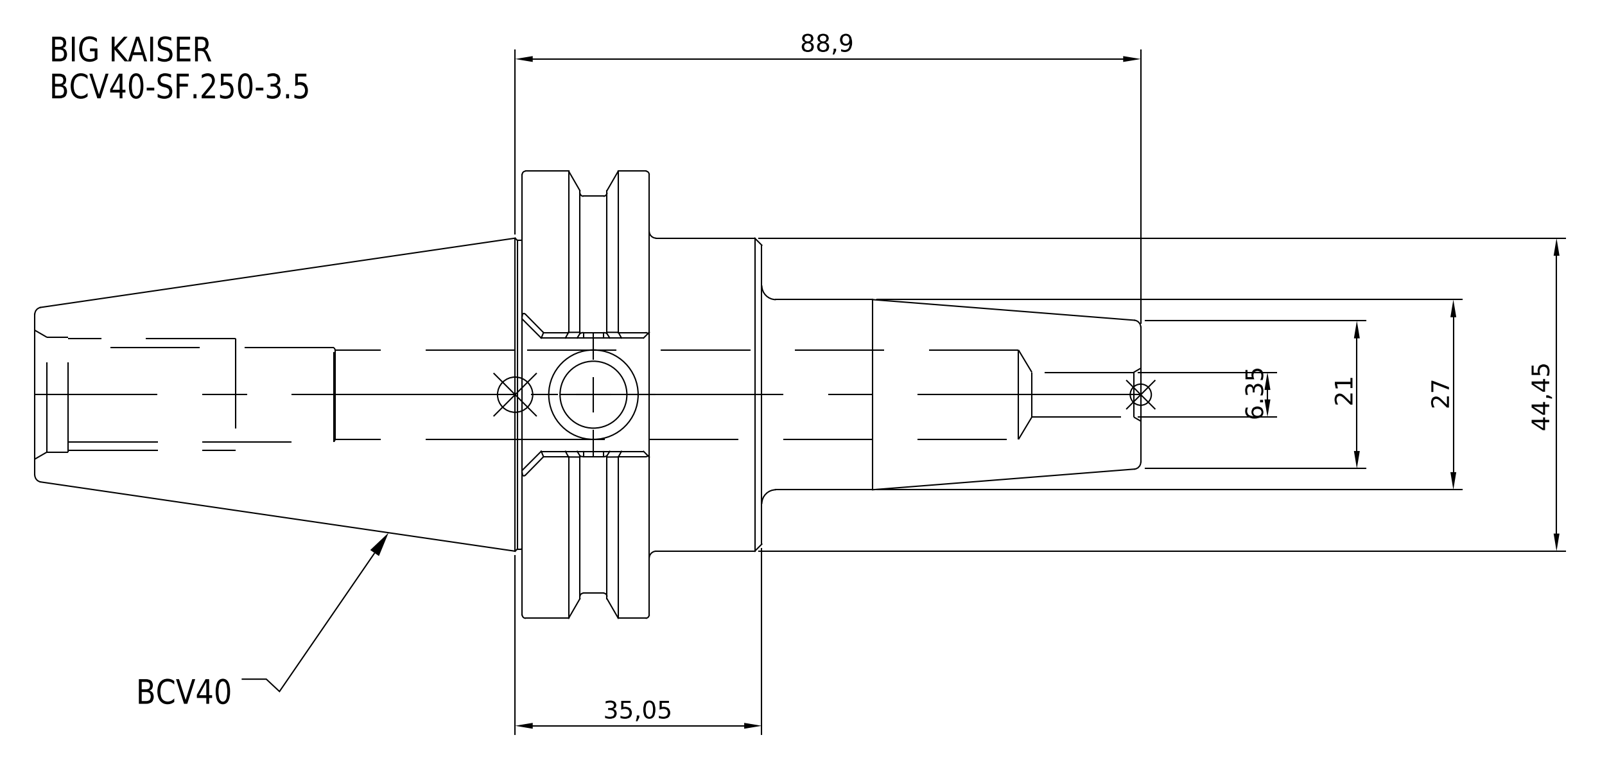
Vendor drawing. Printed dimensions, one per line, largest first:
88,9
44,45
35,05
27
21
6.35
